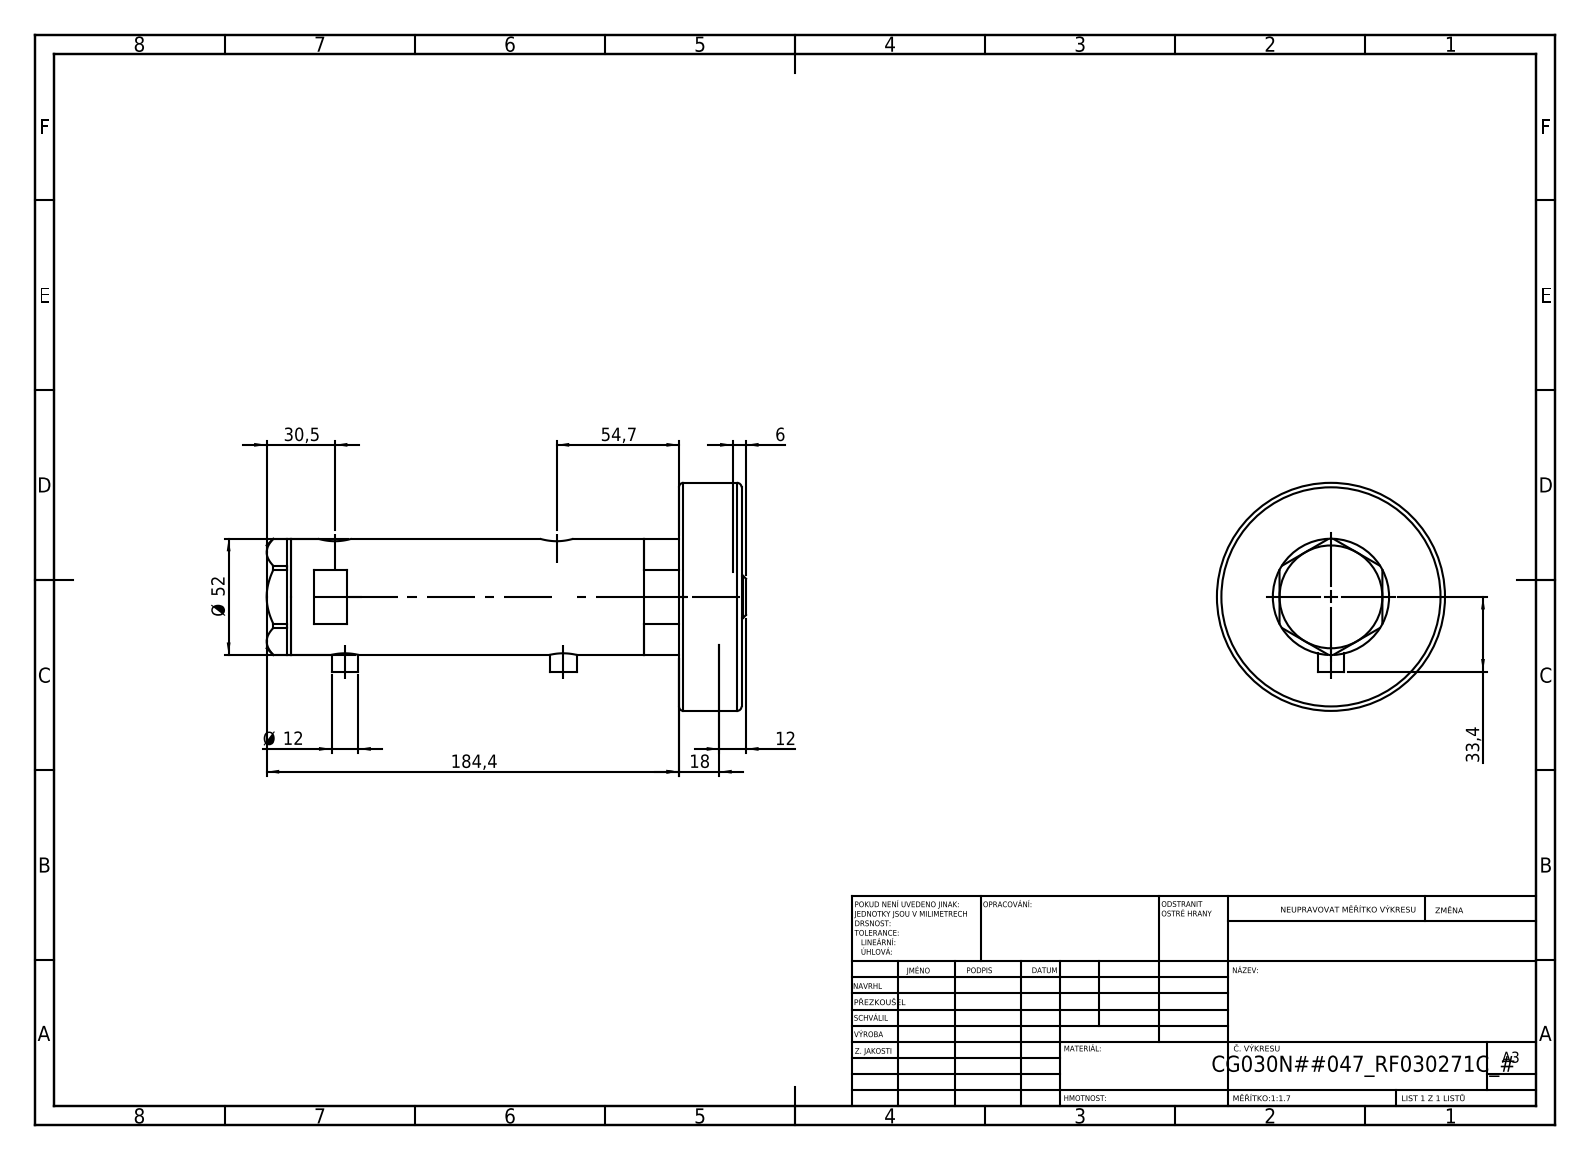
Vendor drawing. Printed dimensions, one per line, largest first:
184,4
54,7
Ø 52
33,4
30,5
18
12
Ø 12
6
